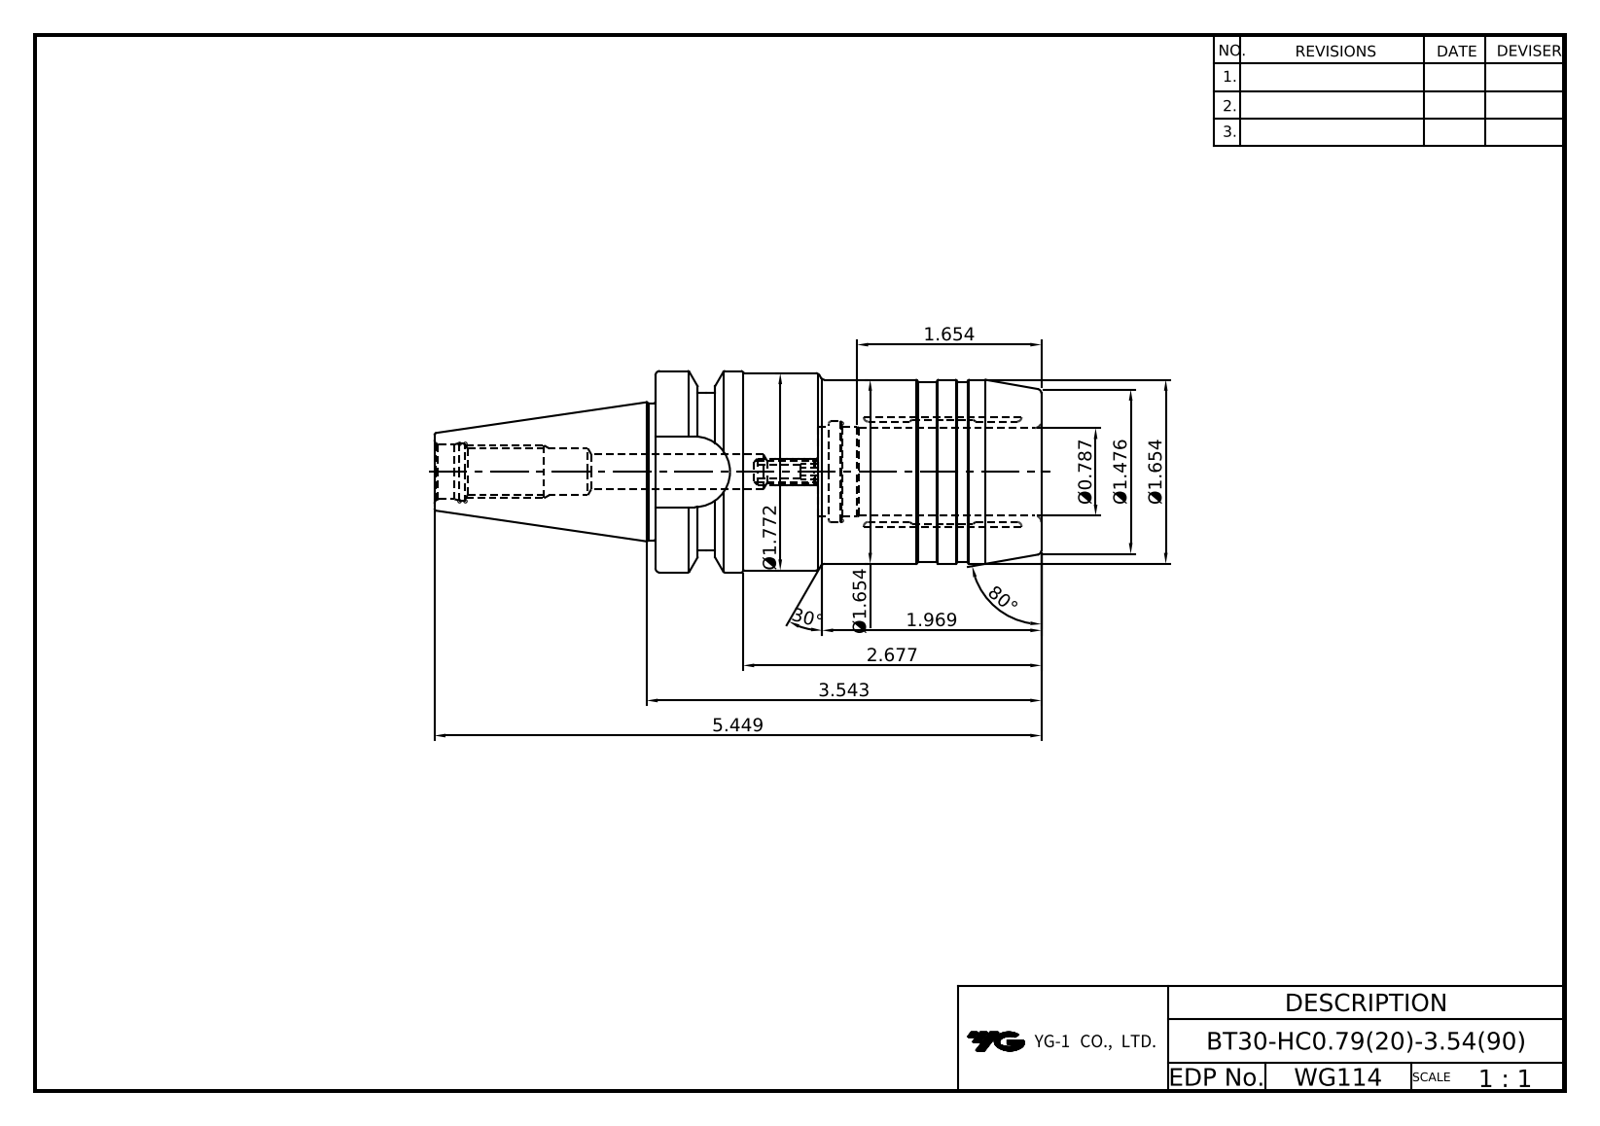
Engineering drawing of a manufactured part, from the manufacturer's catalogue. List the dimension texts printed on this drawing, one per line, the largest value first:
80°
30°
5.449
3.543
2.677
1.969
Ø1.772
Ø1.654
Ø1.654
1.654
Ø1.476
Ø0.787
